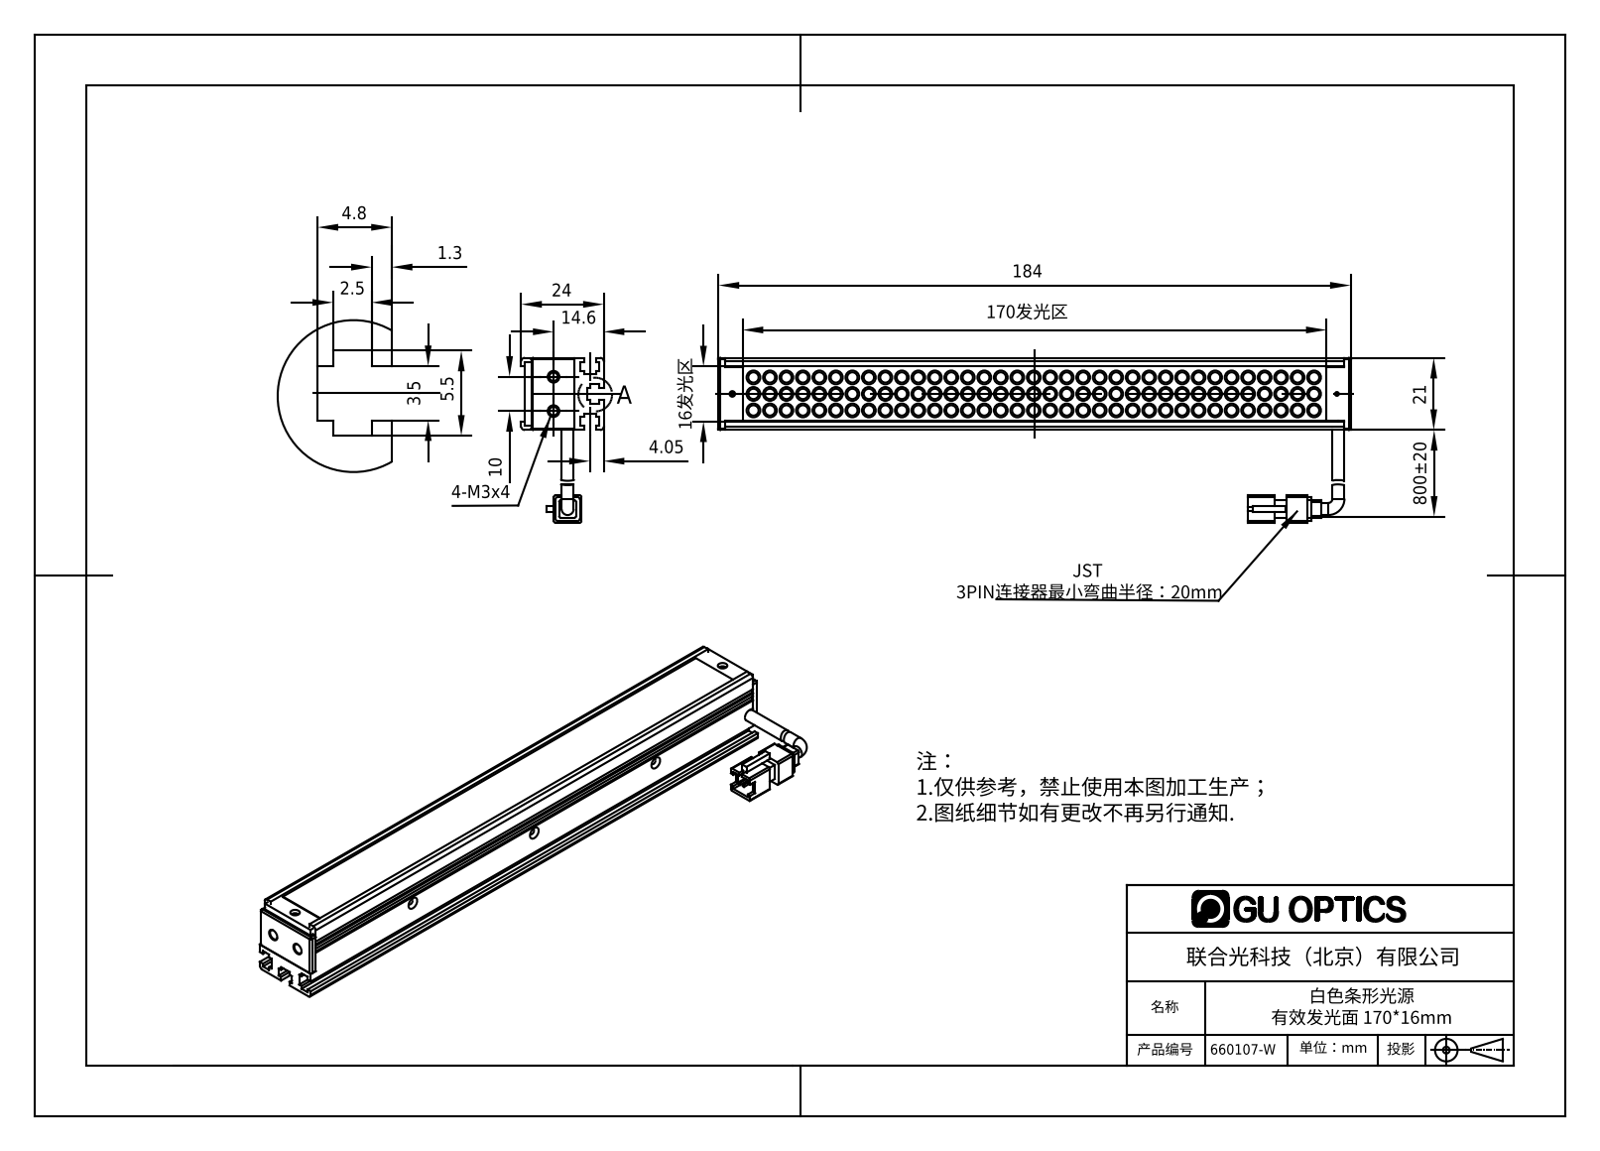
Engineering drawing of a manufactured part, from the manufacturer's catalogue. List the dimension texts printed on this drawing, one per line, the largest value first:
800±20
184
170发光区
24
21
16发光区
14.6
10
5.5
4.8
4.05
3.5
2.5
1.3
